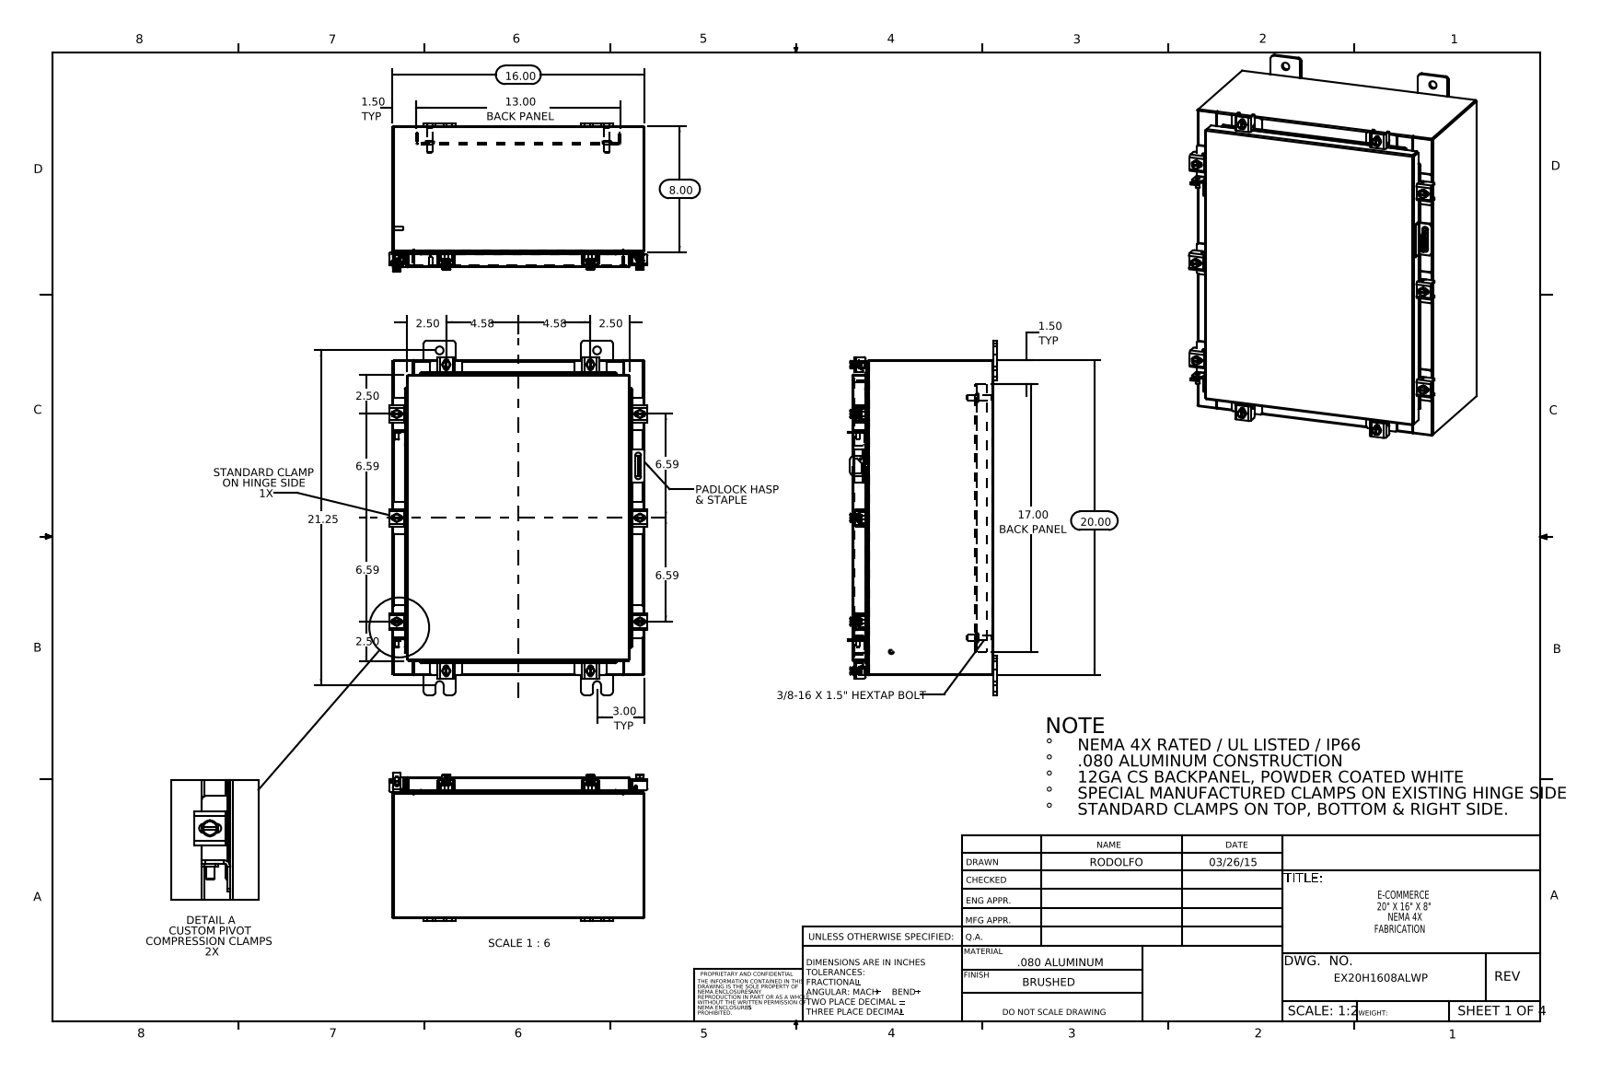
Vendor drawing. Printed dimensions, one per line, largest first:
21.25
20.00
17.00 BACK PANEL
16.00
13.00 BACK PANEL
8.00
6.59
6.59
6.59
6.59
4.58
4.58
3.00 TYP
2.50
2.50
2.50
2.50
1.50 TYP
1.50 TYP
